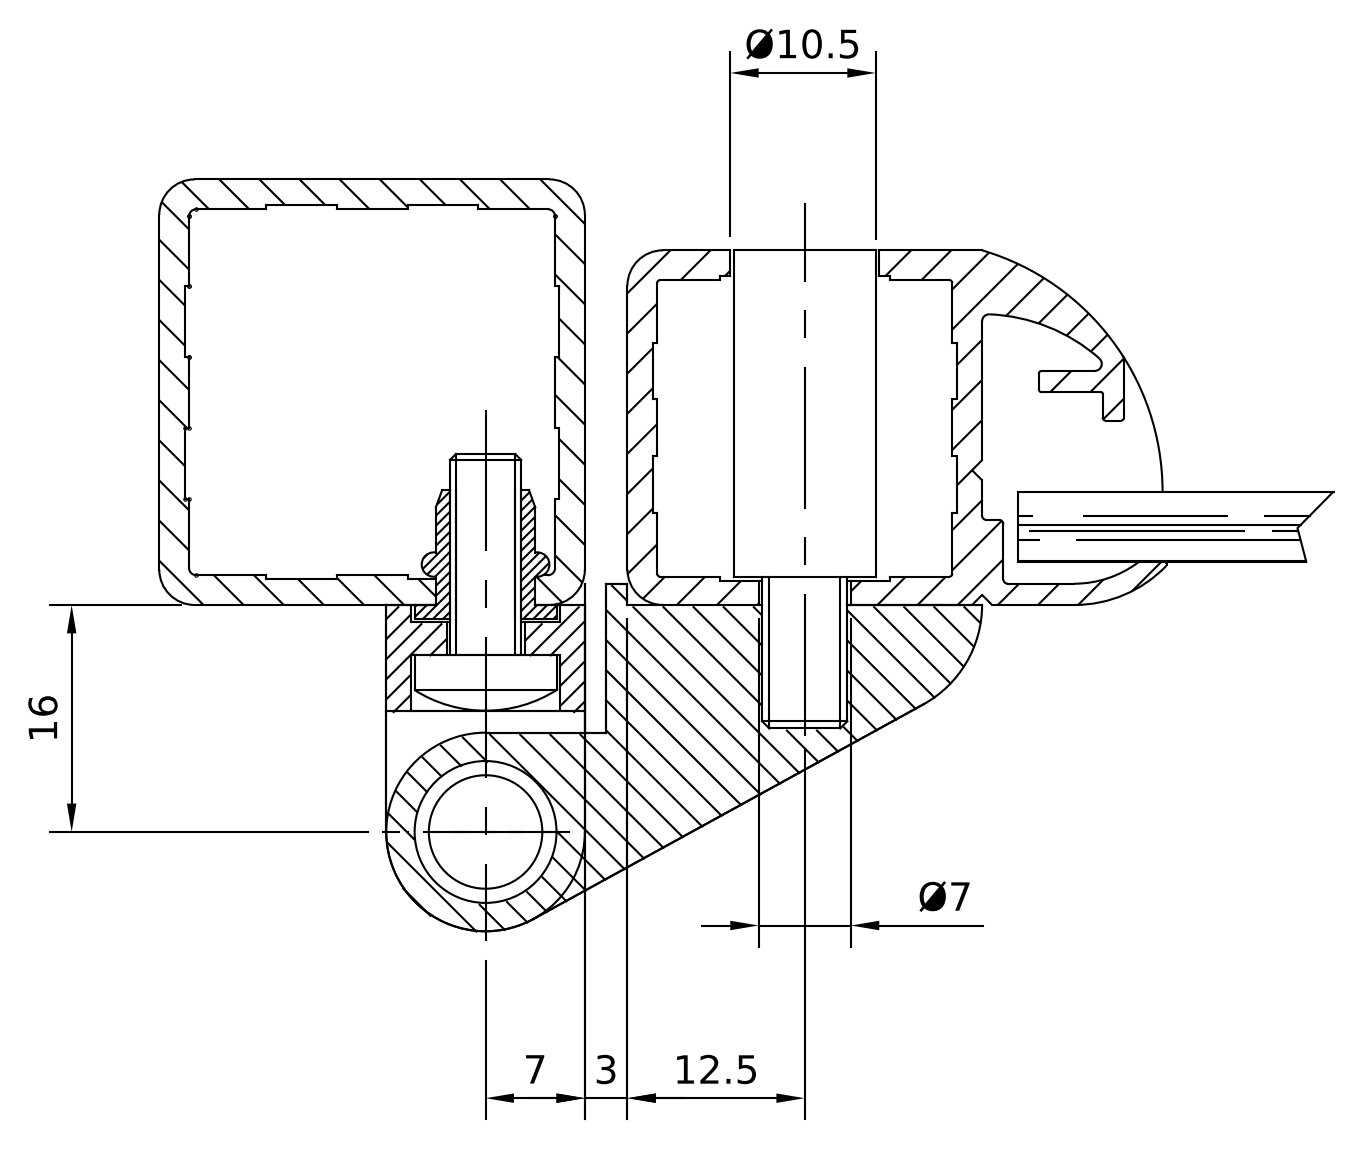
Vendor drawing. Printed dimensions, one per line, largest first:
16
12.5
Ø10.5
Ø7
7
3
